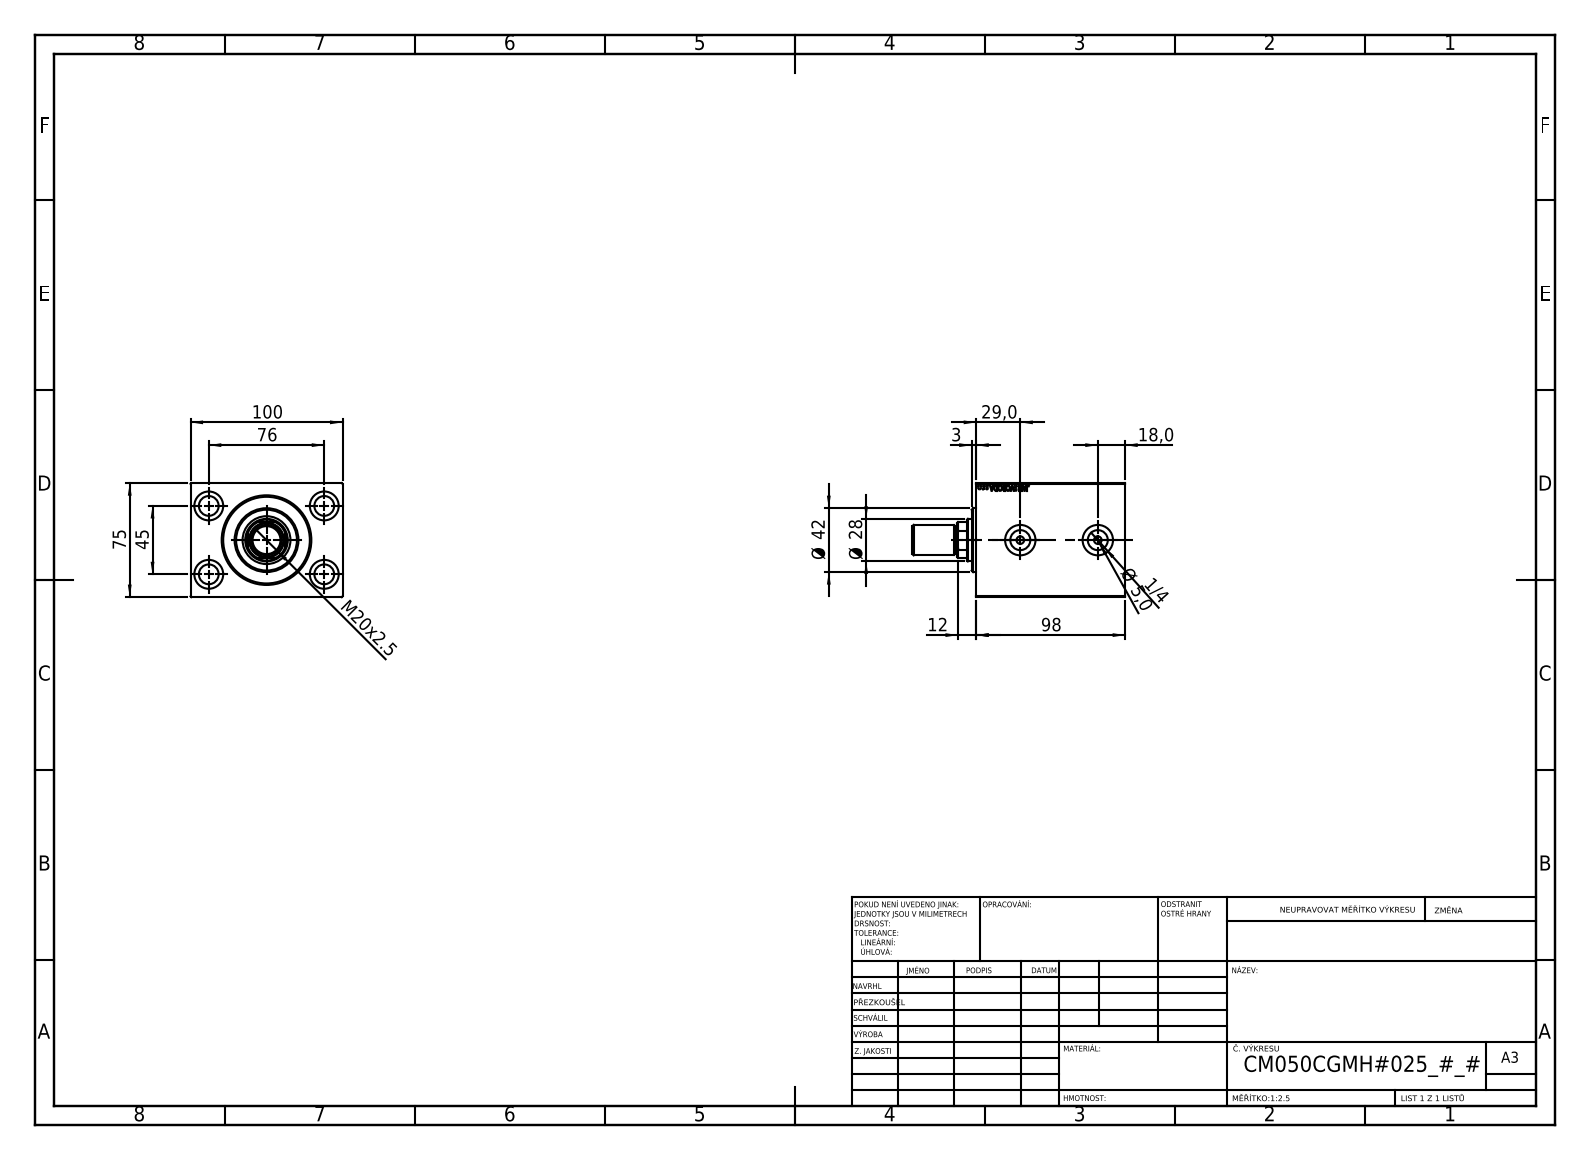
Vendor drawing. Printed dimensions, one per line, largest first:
100
98
76
75
45
Ø 42
29,0
Ø 28
M20x2.5
18,0
12
Ø 5,0
3
1/4
